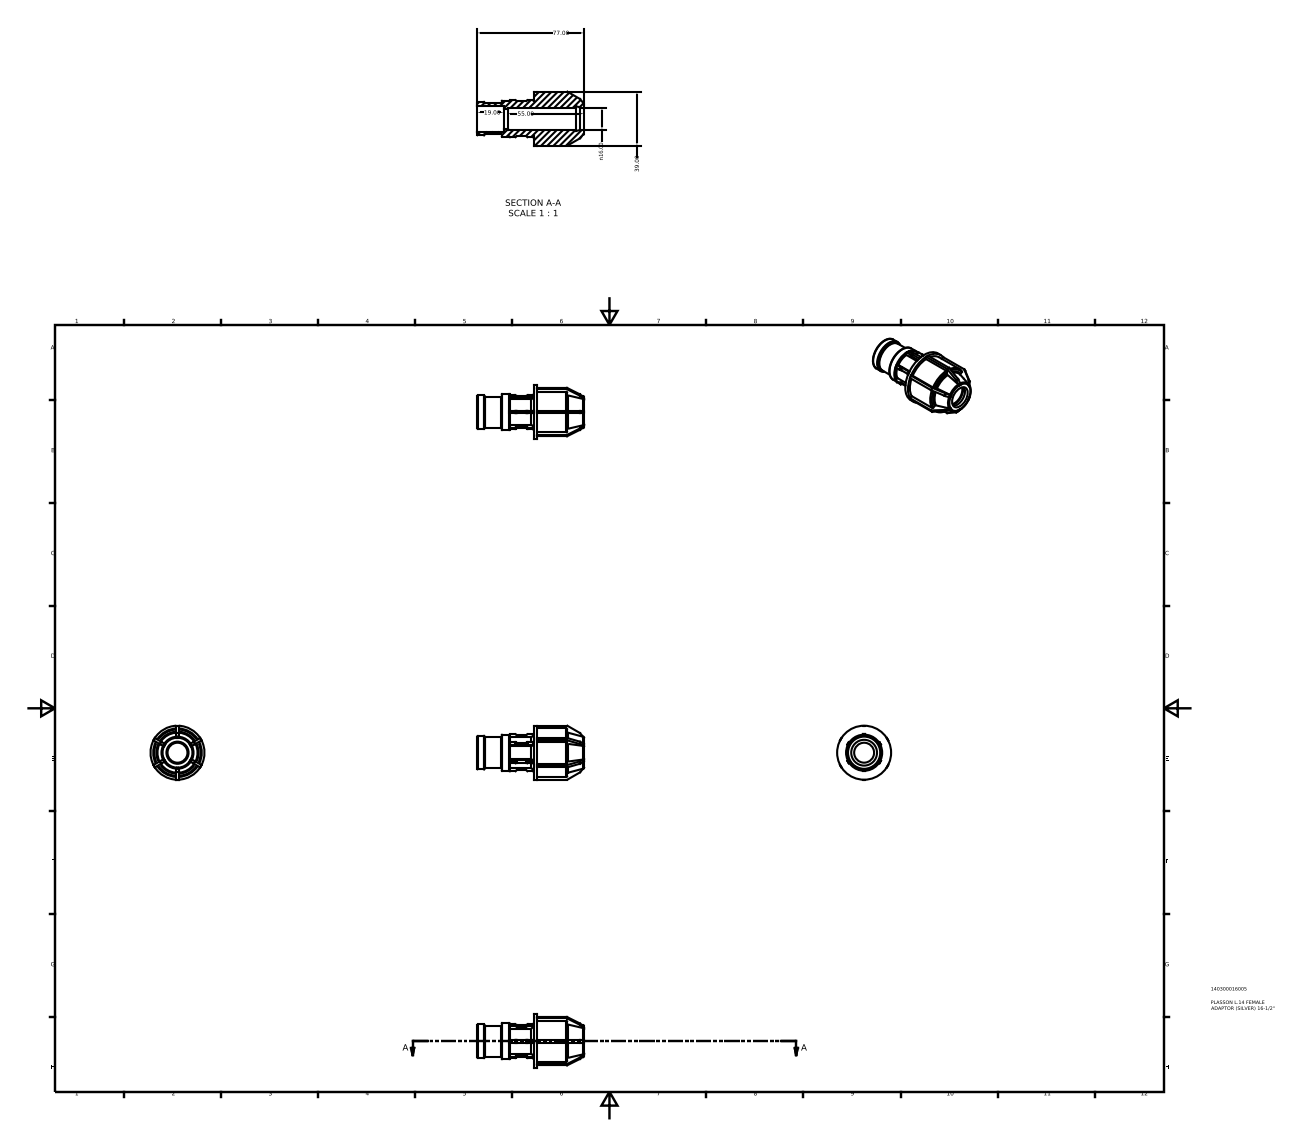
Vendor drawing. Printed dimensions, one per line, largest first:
77.00
55.00
39.00
19.00
n16.00
